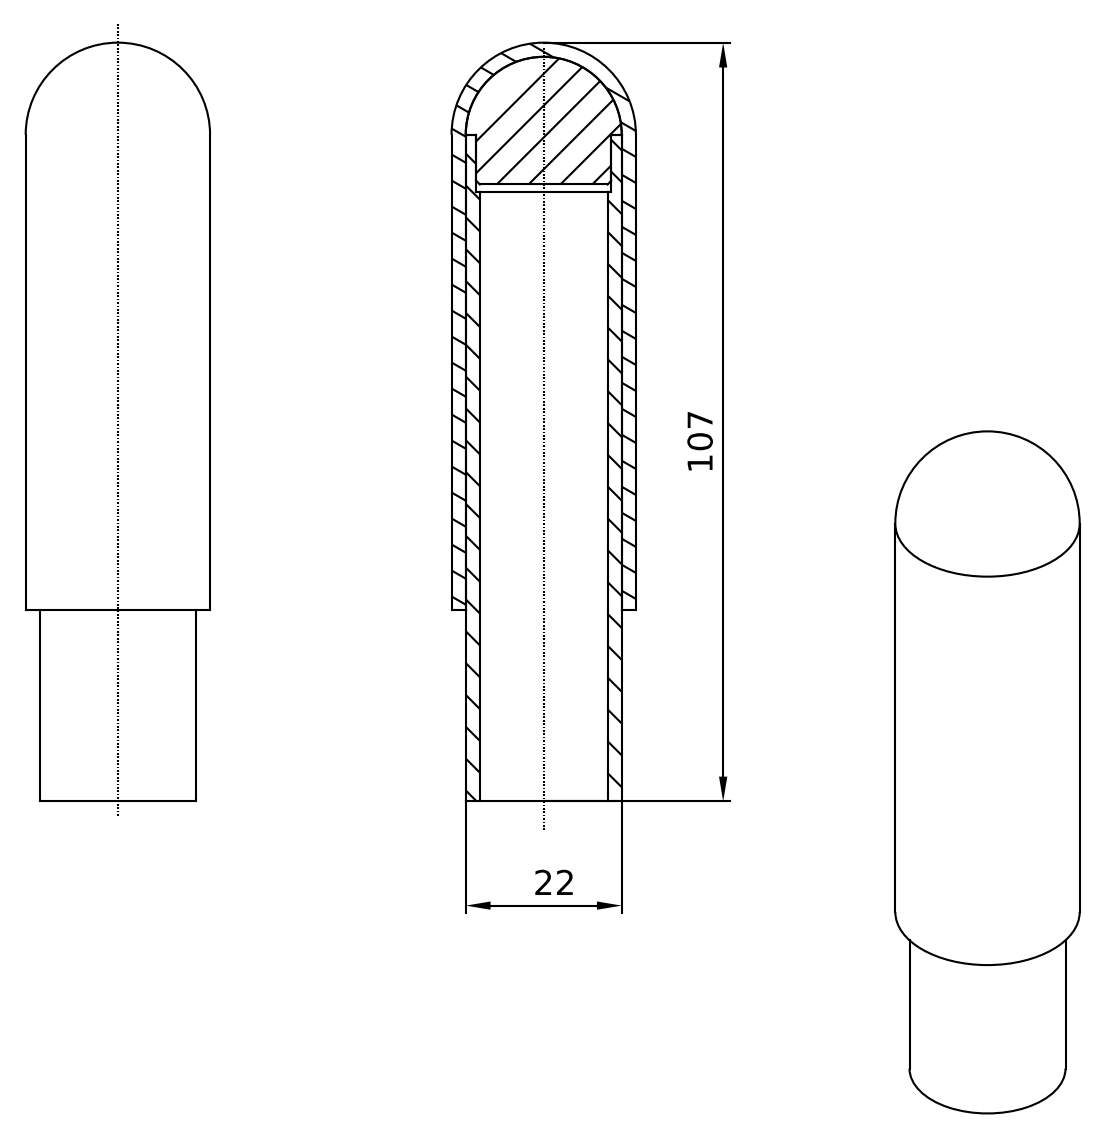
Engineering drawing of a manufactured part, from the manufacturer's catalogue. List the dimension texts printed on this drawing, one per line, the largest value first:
107
22
